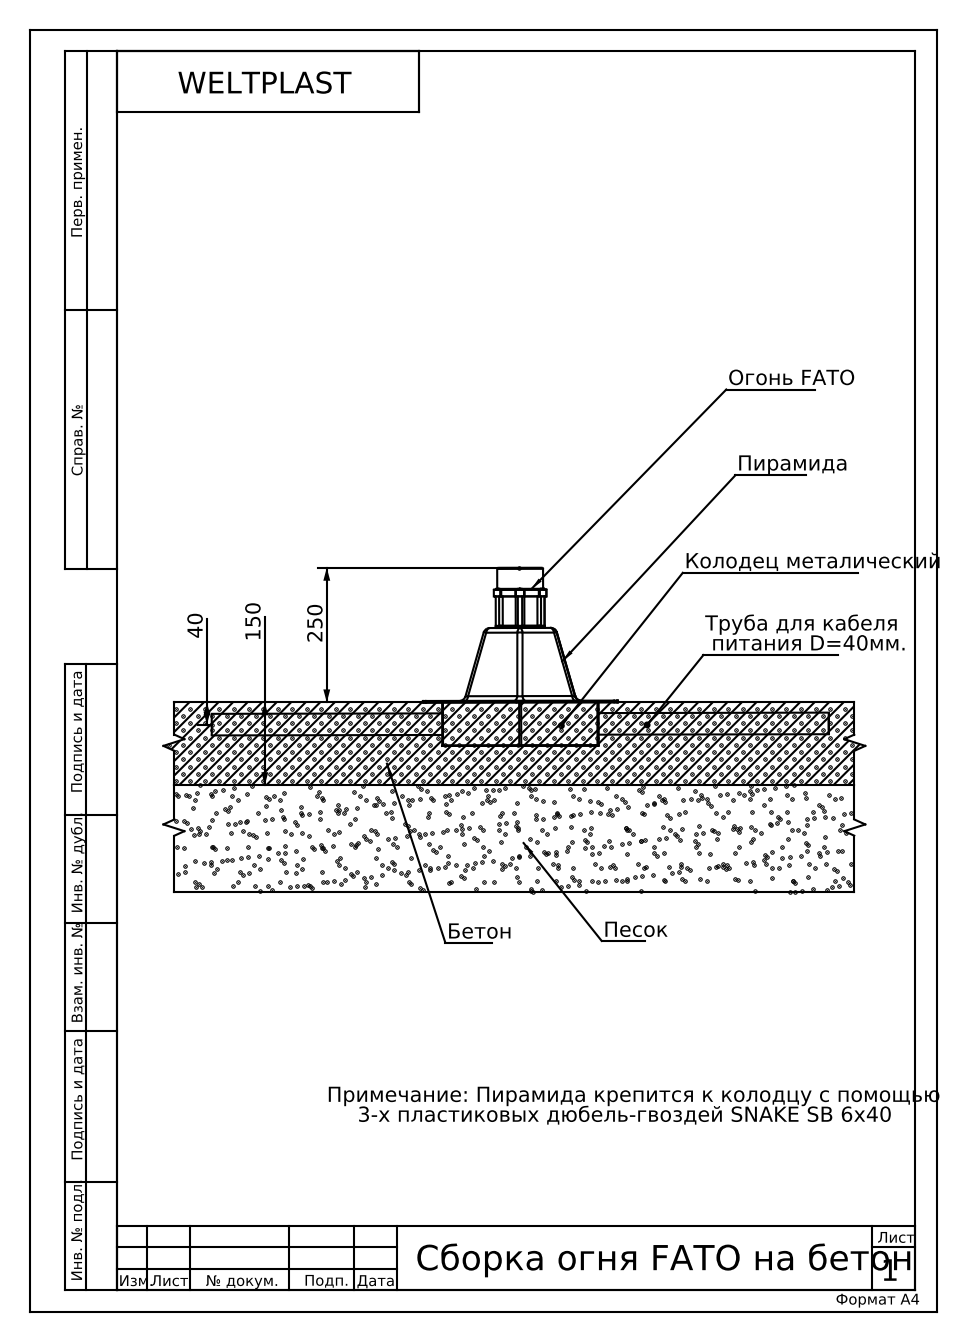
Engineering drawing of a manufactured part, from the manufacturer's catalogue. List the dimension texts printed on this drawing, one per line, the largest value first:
250
150
40
